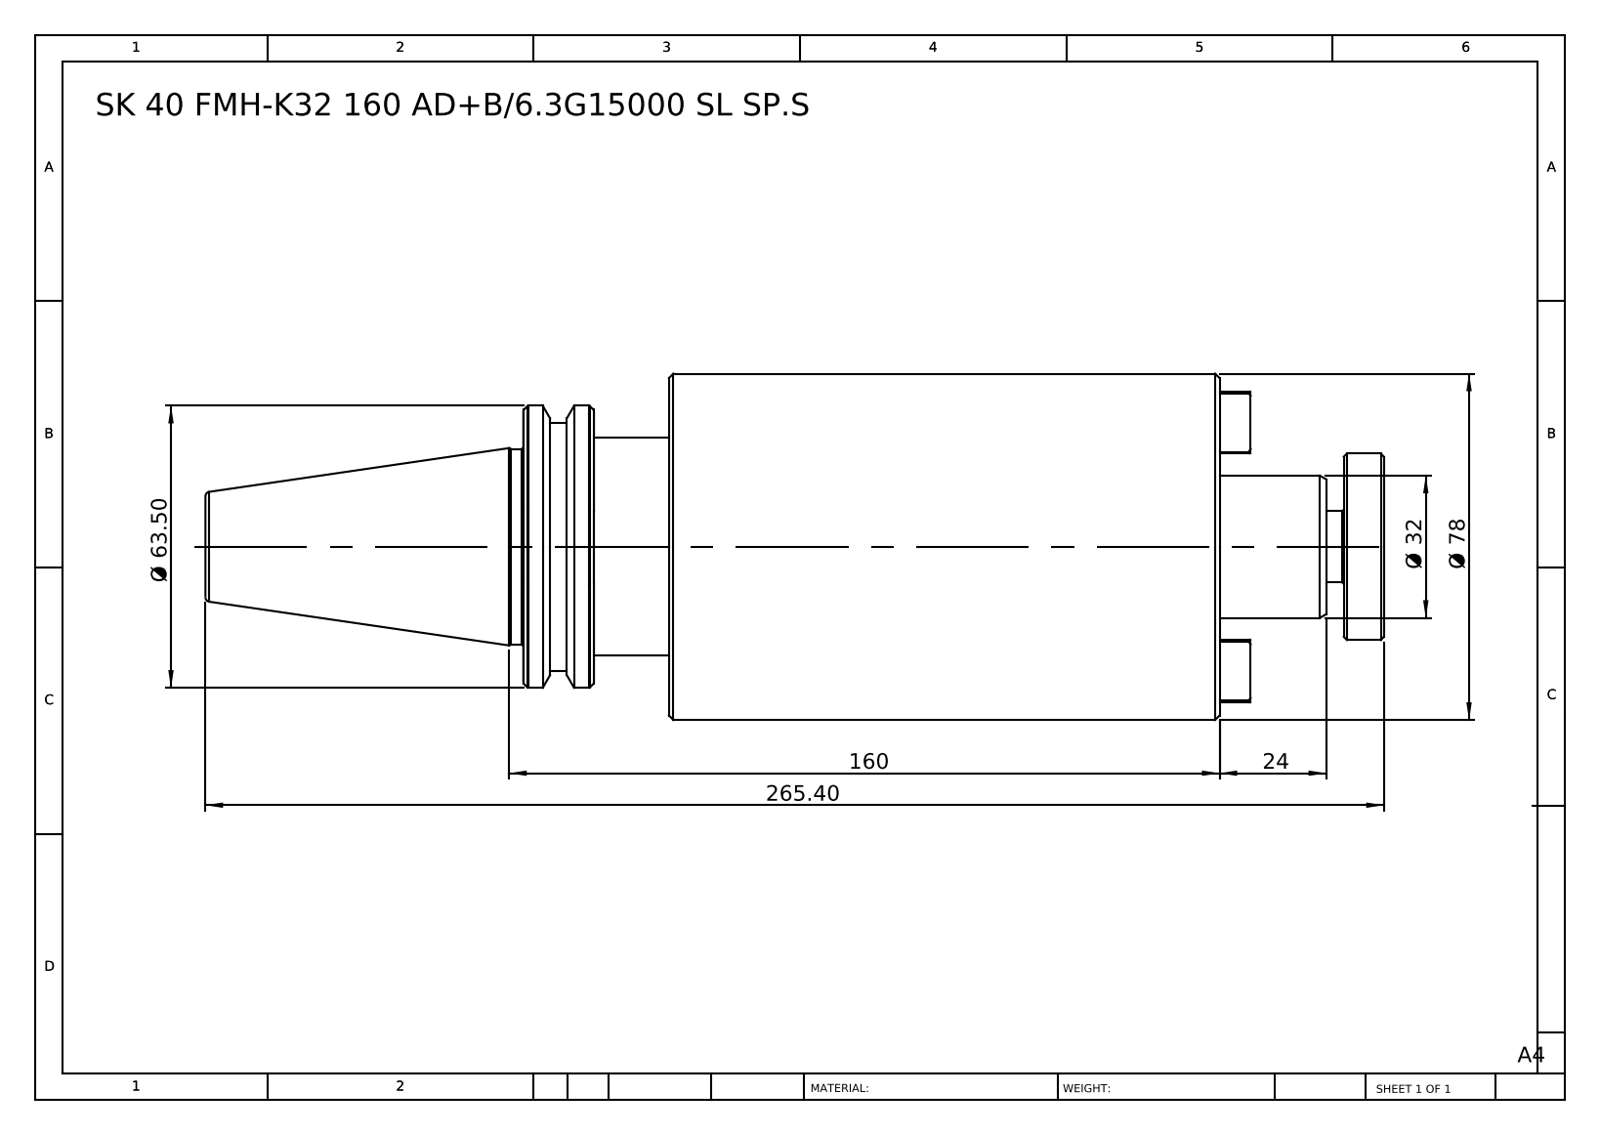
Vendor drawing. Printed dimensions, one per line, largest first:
265.40
160
Ø 78
Ø 63.50
Ø 32
24
